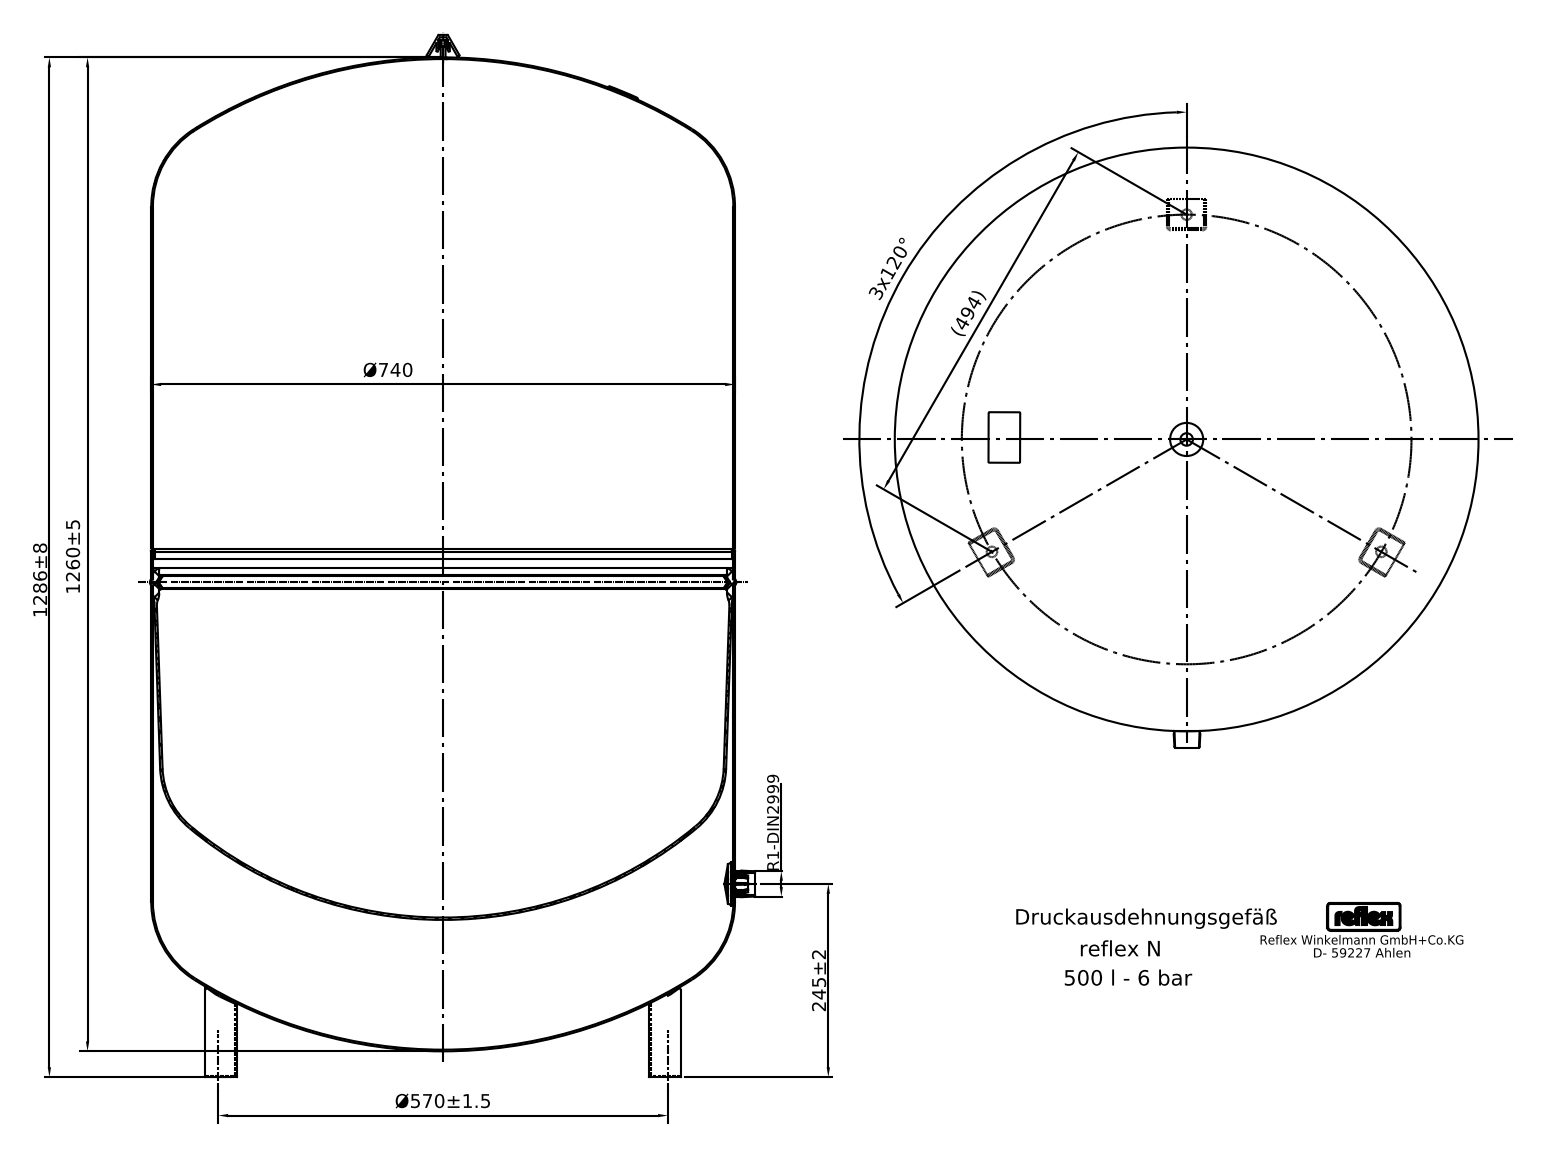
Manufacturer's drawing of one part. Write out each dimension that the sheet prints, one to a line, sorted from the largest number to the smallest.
1286±8
1260±5
Ø740
Ø570±1.5
(494)
245±2
3x120°
R1-DIN2999
